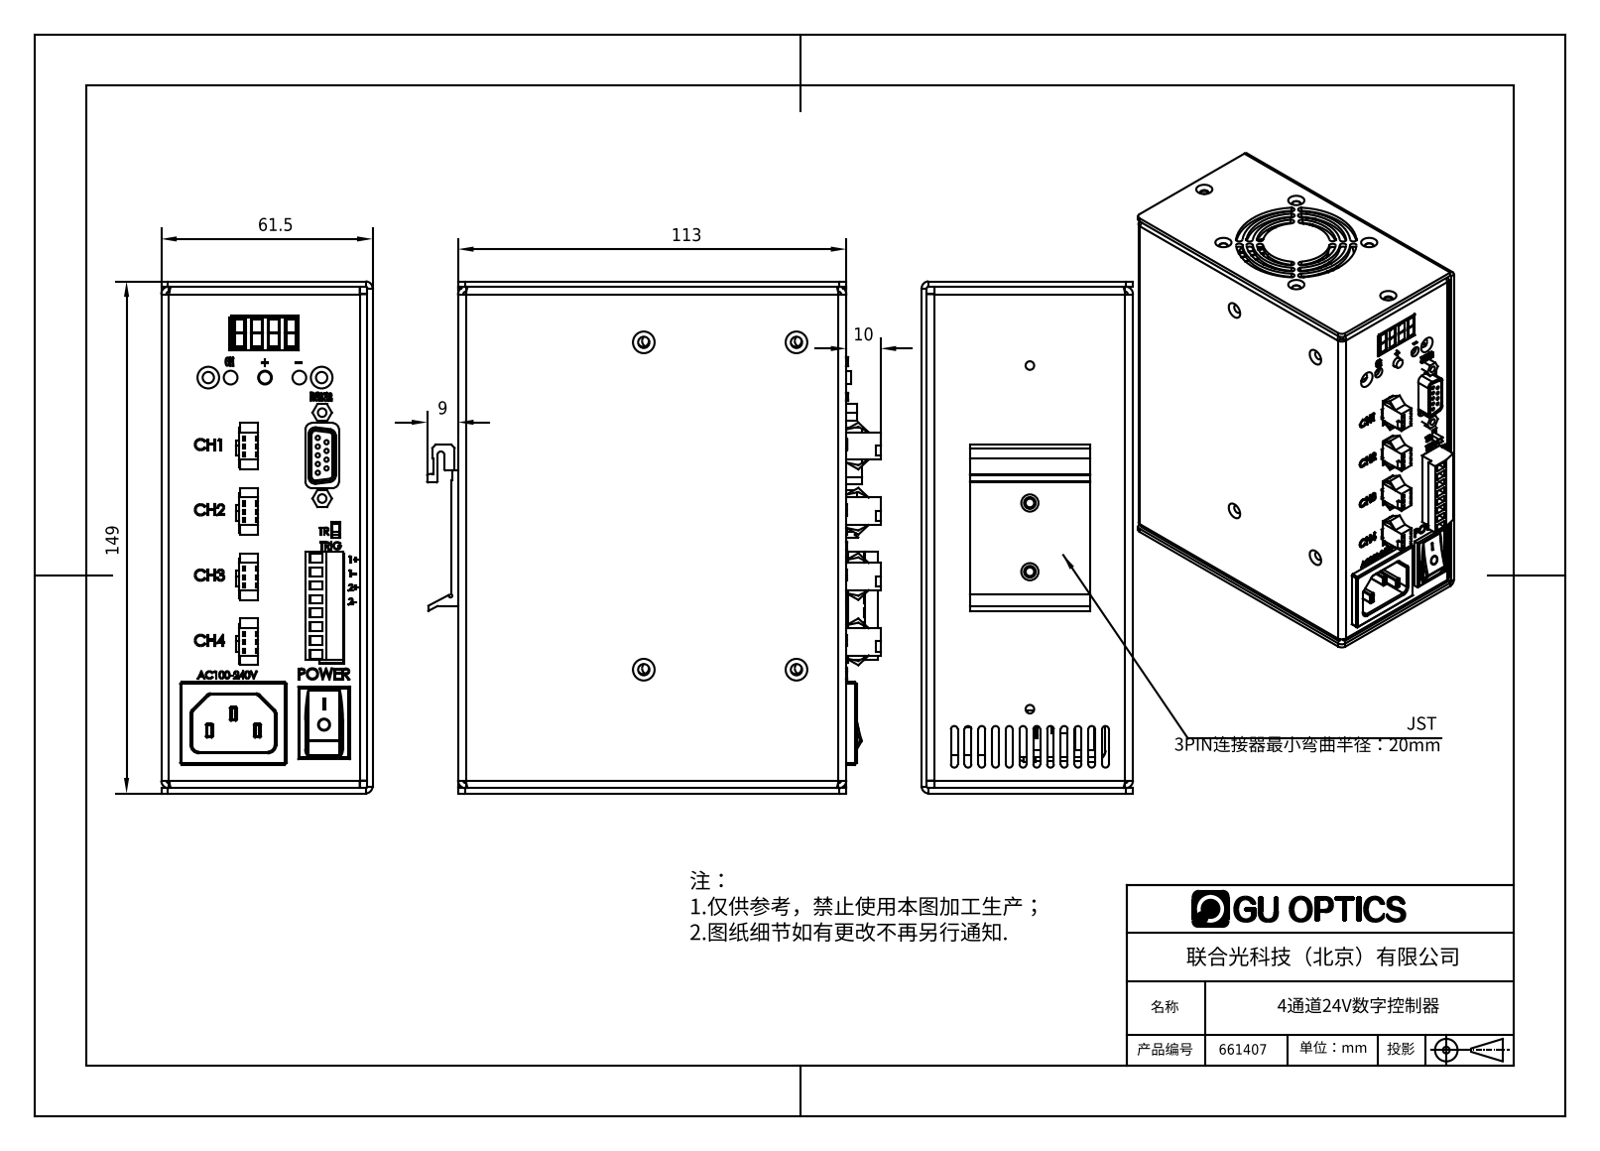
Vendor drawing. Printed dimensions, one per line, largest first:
149
113
61.5
10
9
